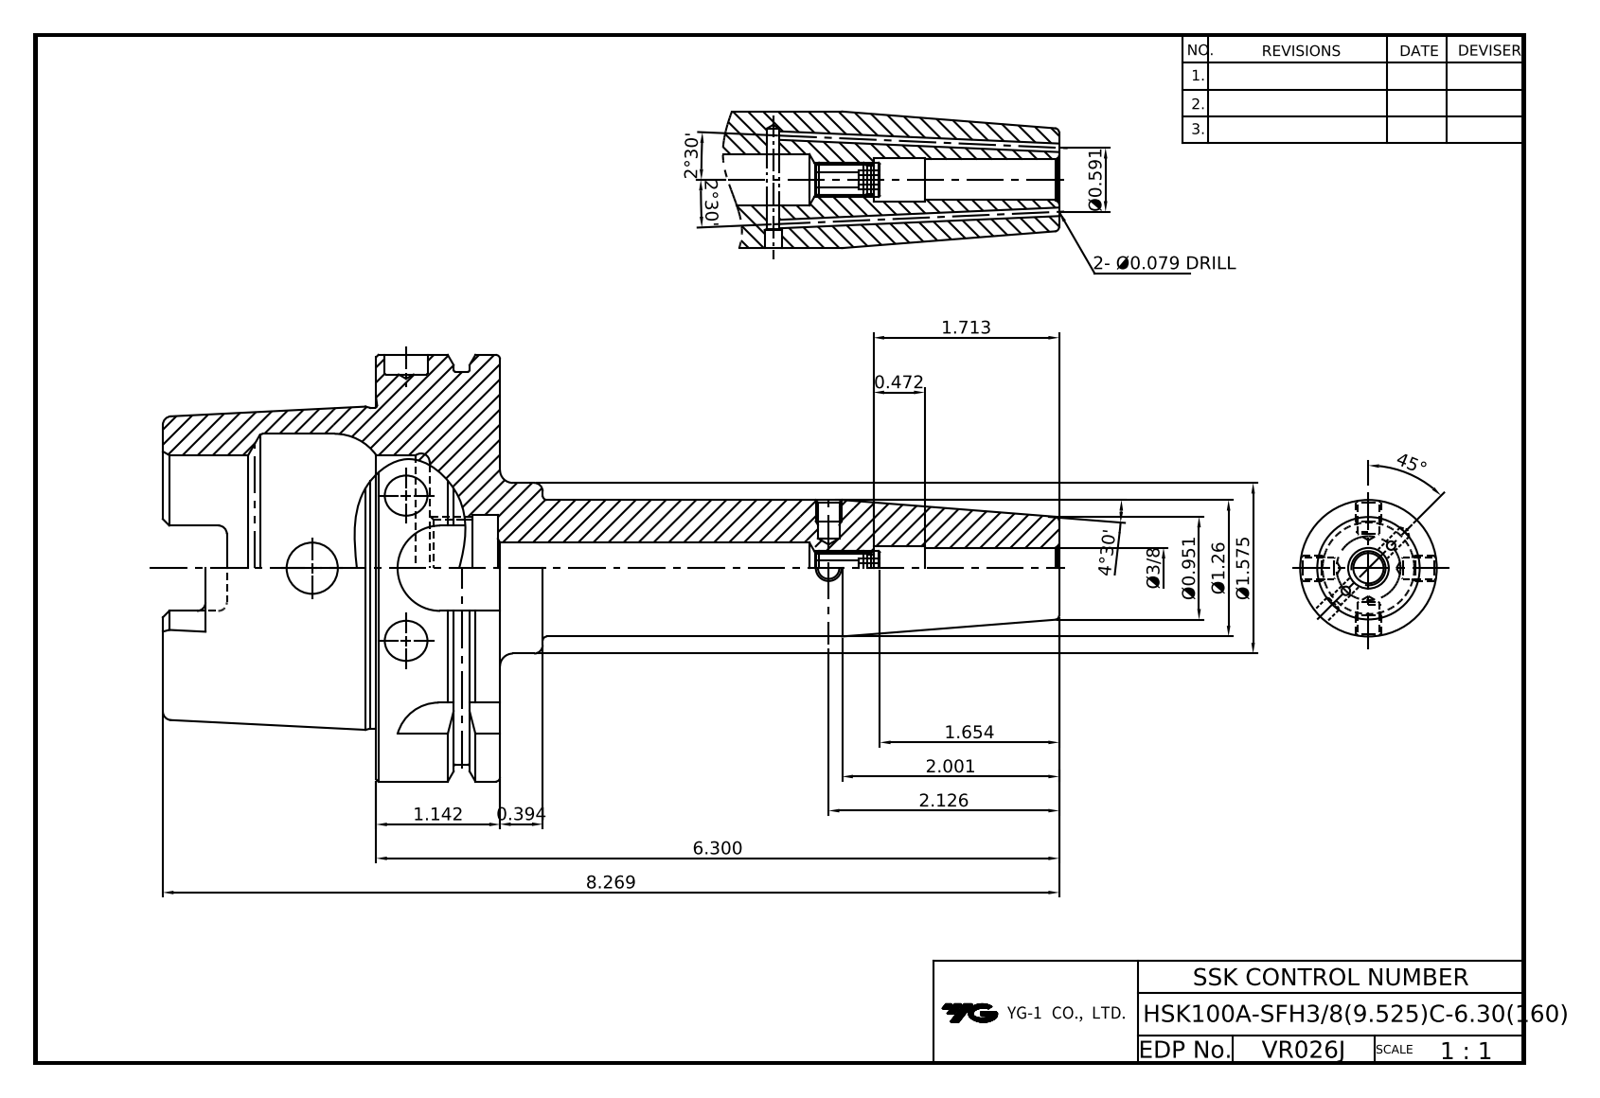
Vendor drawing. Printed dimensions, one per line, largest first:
45°
8.269
6.300
4°30'
2.126
2.001
2°30'
2°30'
1.713
1.654
Ø1.575
Ø1.26
1.142
Ø0.951
Ø0.591
0.472
0.394
